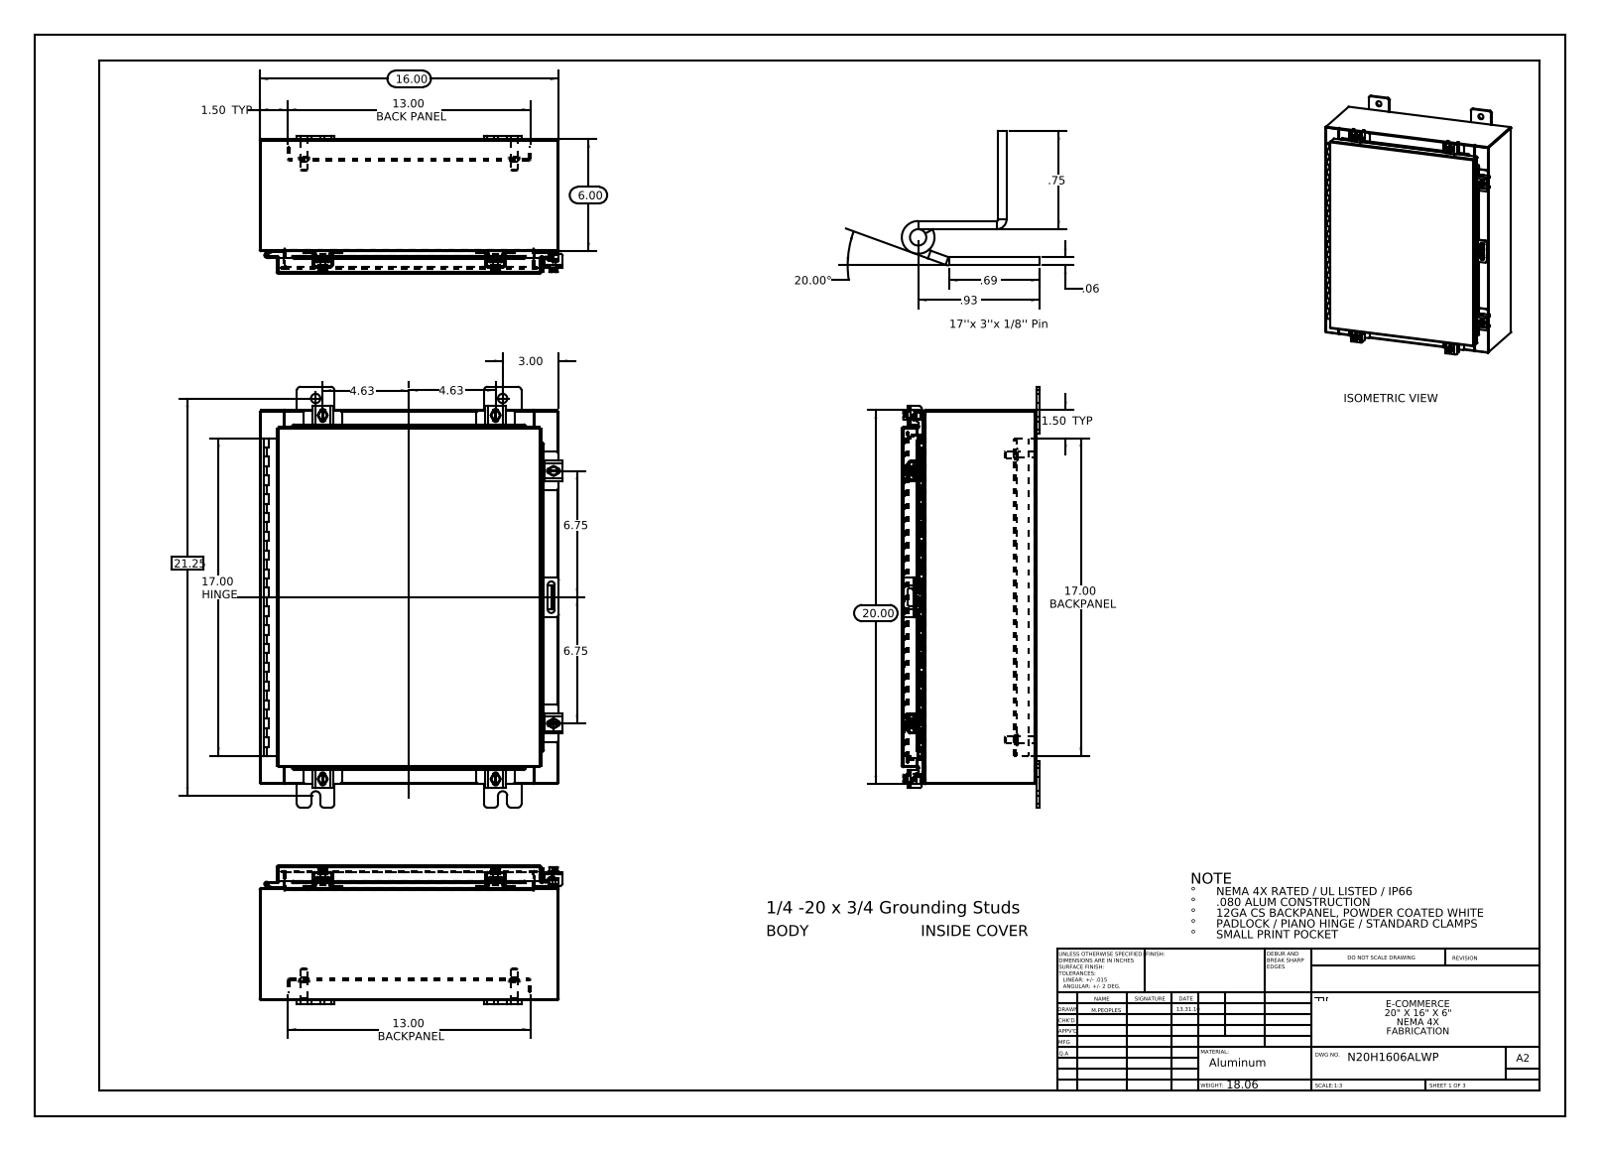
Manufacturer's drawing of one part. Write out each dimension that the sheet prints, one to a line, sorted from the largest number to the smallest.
21.25
20.00
20.00°
17.00 HINGE
17.00 BACKPANEL
16.00
13.00 BACKPANEL
13.00 BACK PANEL
6.75
6.75
6.00
4.63
4.63
3.00
1.50 TYP
1.50 TYP
.93
.75
.69
.06
